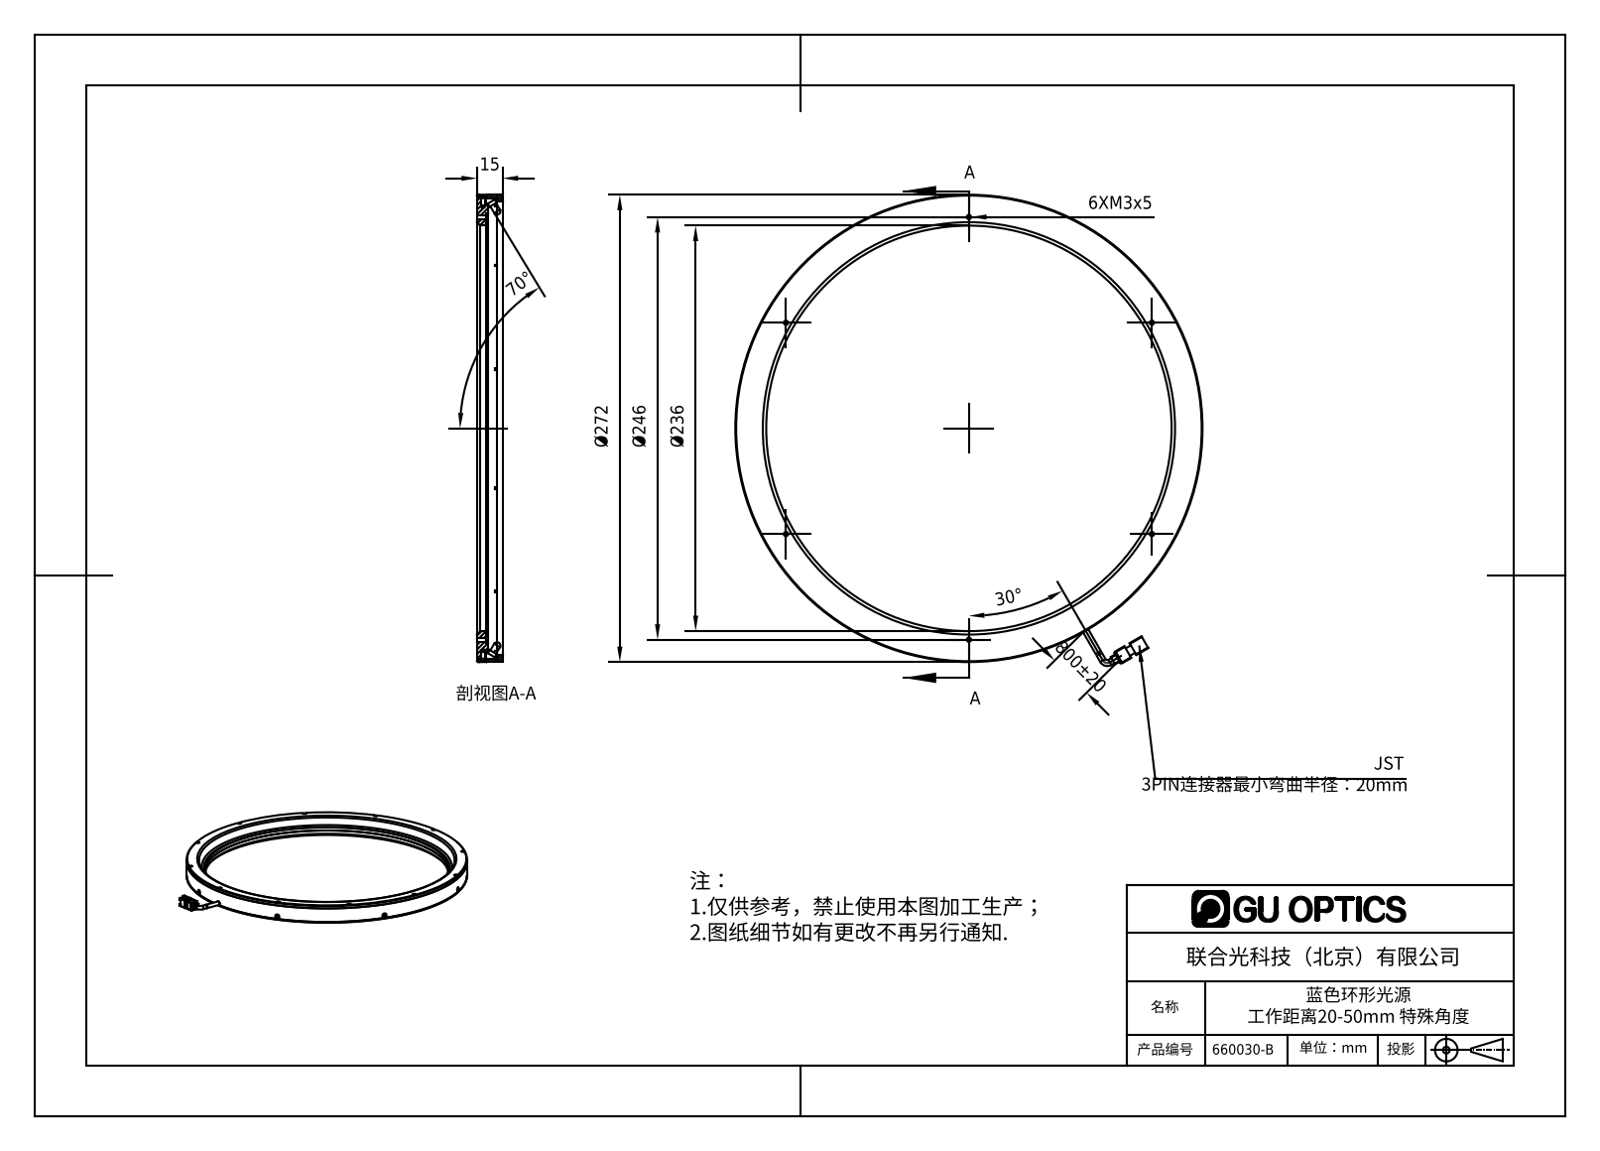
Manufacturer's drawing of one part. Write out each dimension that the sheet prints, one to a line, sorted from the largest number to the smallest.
800±20
Ø272
Ø246
Ø236
70°
30°
15
6XM3x5
